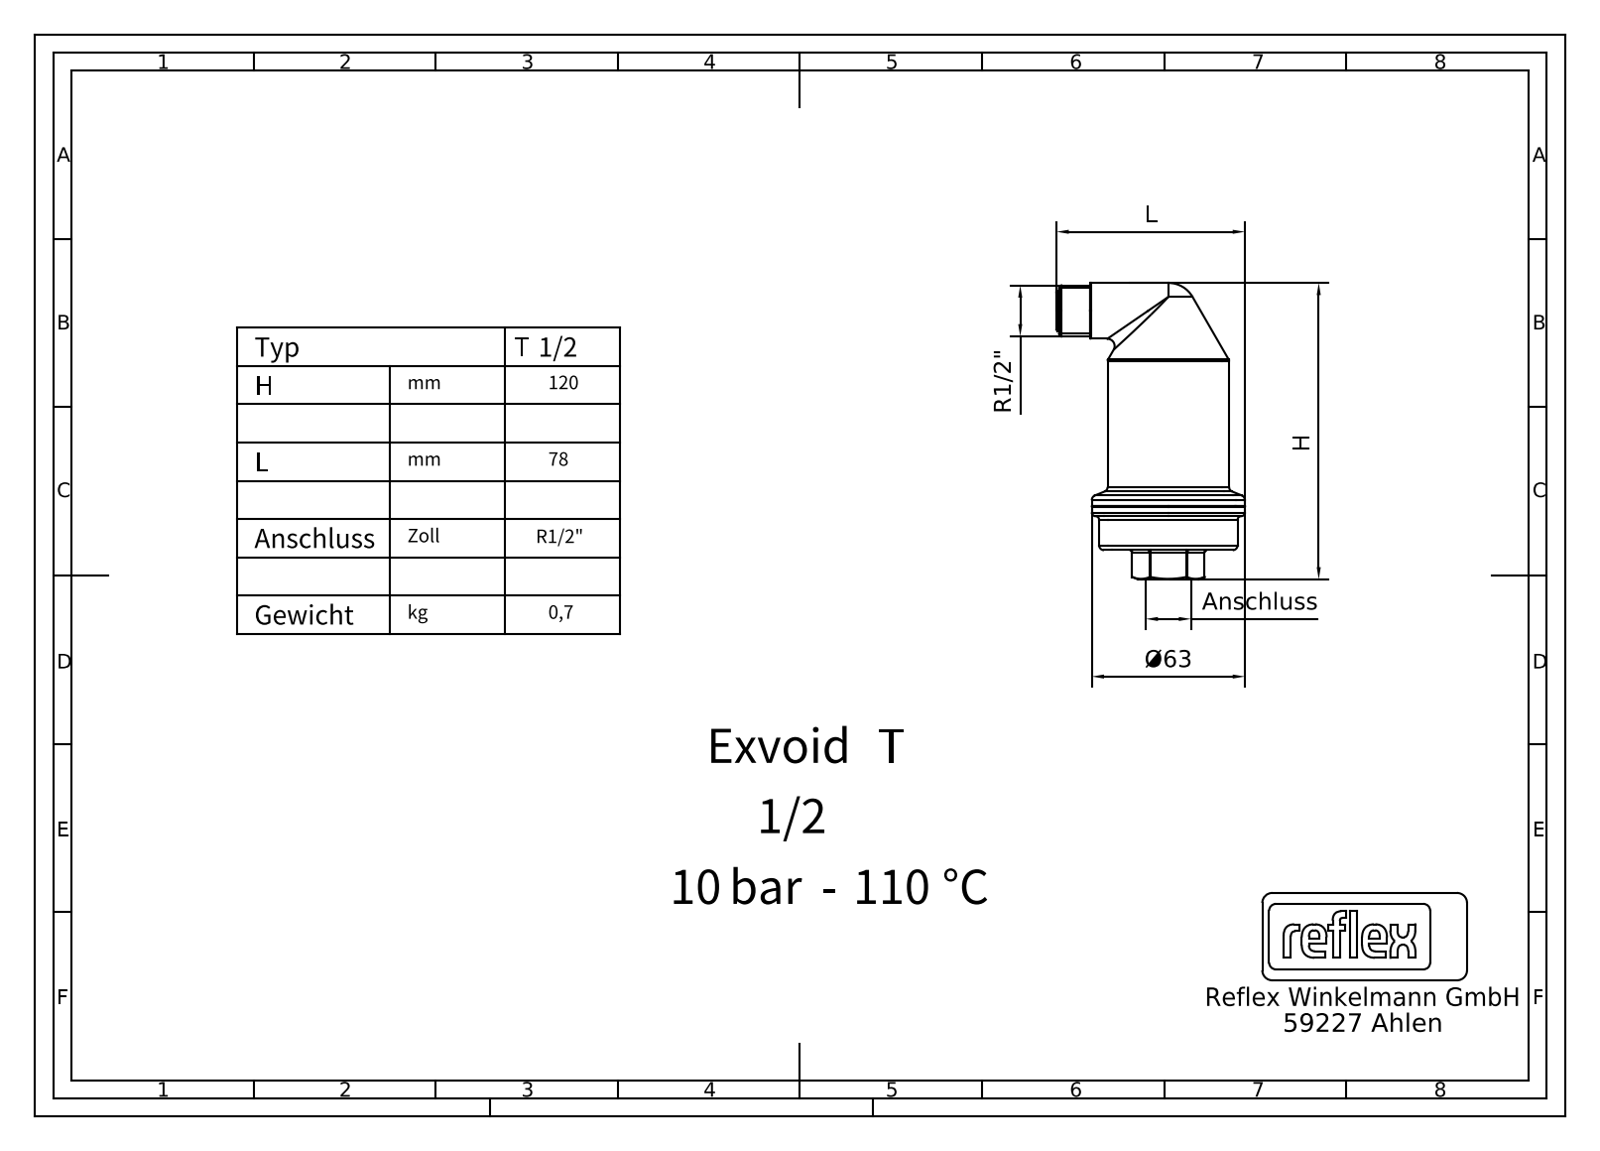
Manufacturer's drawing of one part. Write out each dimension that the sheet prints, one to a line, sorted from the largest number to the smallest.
Ø63
R1/2"
L
H
Anschluss
